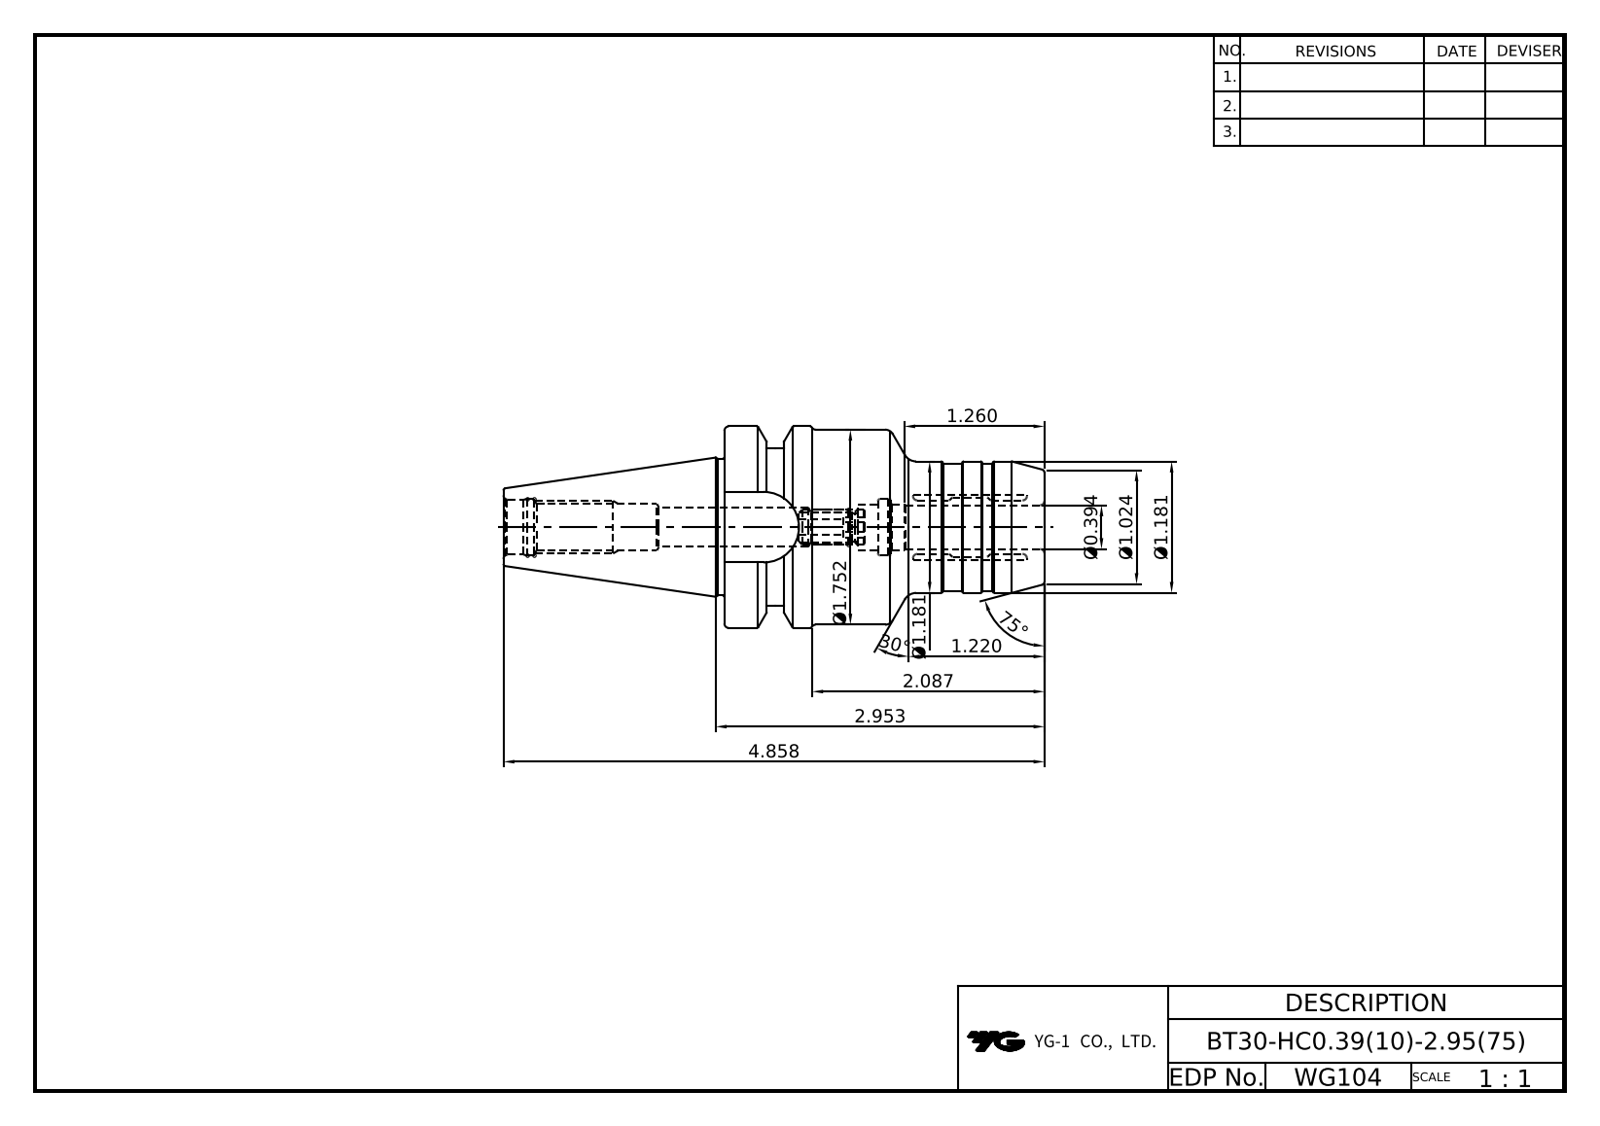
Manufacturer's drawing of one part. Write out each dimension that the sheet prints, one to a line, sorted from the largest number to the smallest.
75°
30°
4.858
2.953
2.087
Ø1.752
1.260
1.220
Ø1.181
Ø1.181
Ø1.024
Ø0.394
